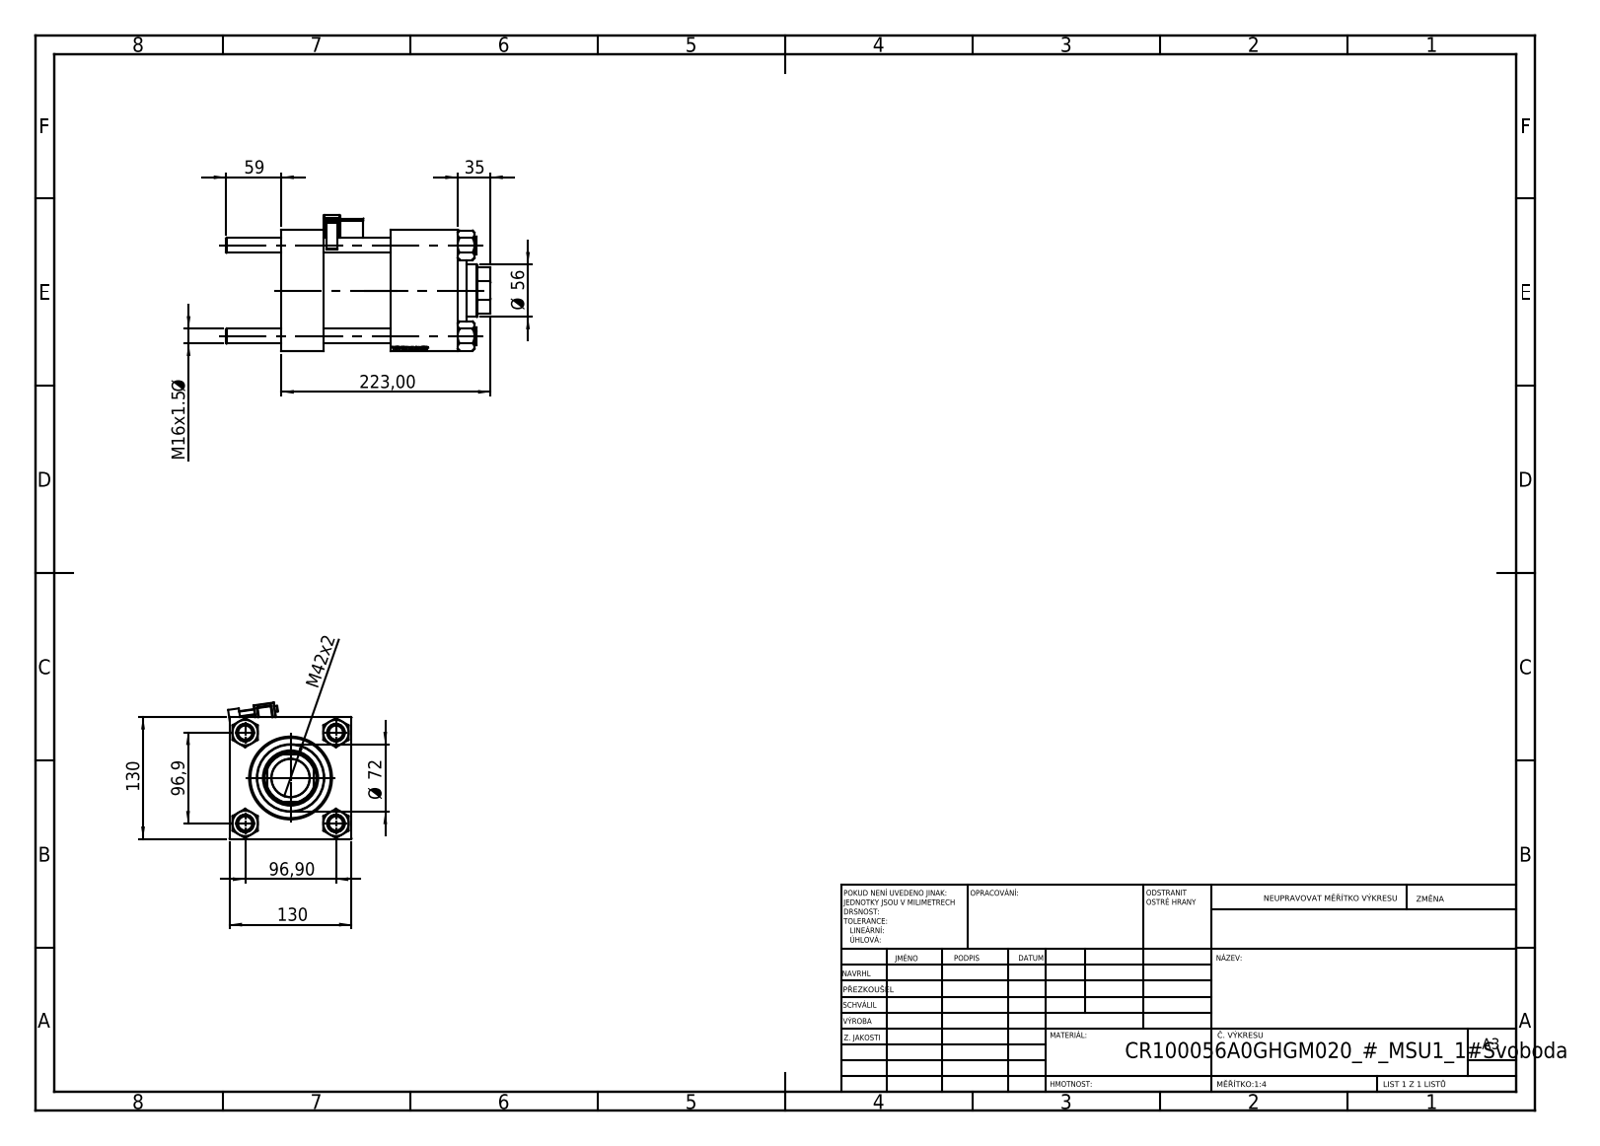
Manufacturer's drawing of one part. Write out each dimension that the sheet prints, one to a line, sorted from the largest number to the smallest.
223,00
130
130
96,9
96,90
Ø 72
59
Ø 56
M42x2
35
M16x1.5 Ø
